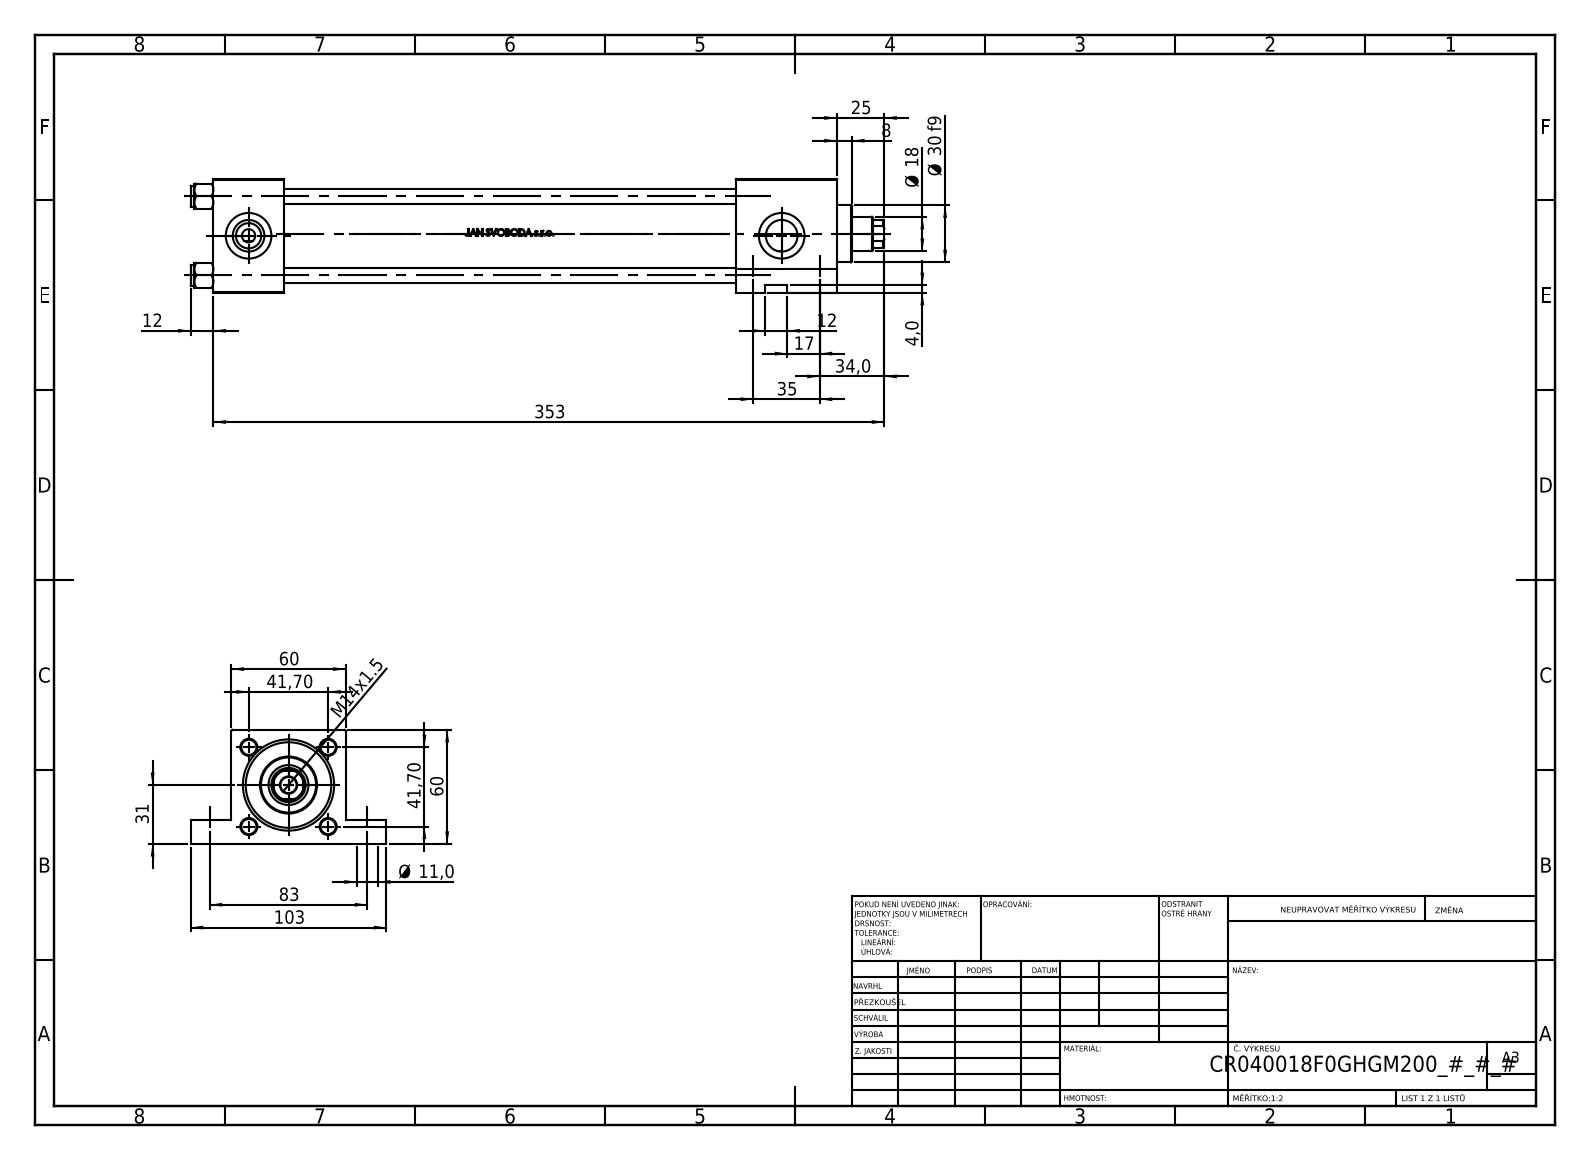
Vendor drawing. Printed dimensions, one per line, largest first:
353
103
83
60
60
41,70
41,70
35
34,0
31
Ø 30 f9
25
Ø 18
17
M14x1.5
12
12
Ø 11,0
8
4,0
